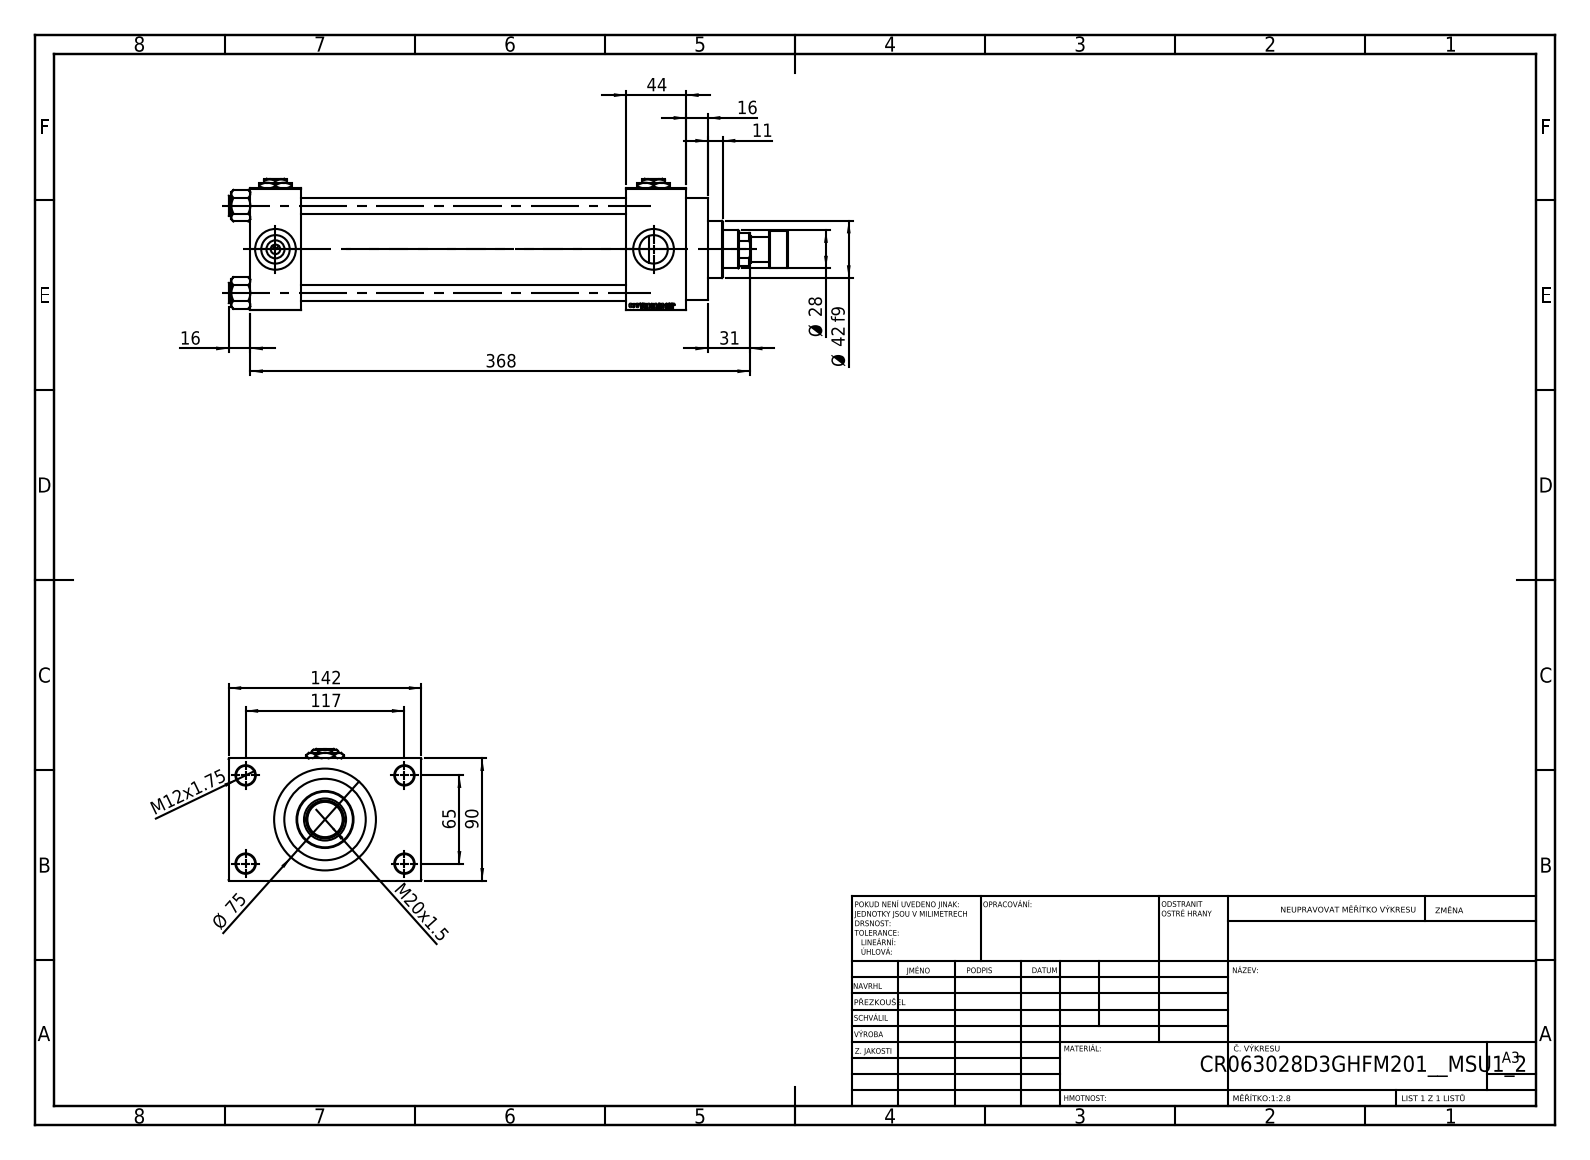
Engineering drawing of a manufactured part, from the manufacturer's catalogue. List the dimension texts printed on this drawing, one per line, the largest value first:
368
142
117
90
Ø 75
65
44
Ø 42 f9
31
Ø 28
M20x1.5
16
16
M12x1.75
11
